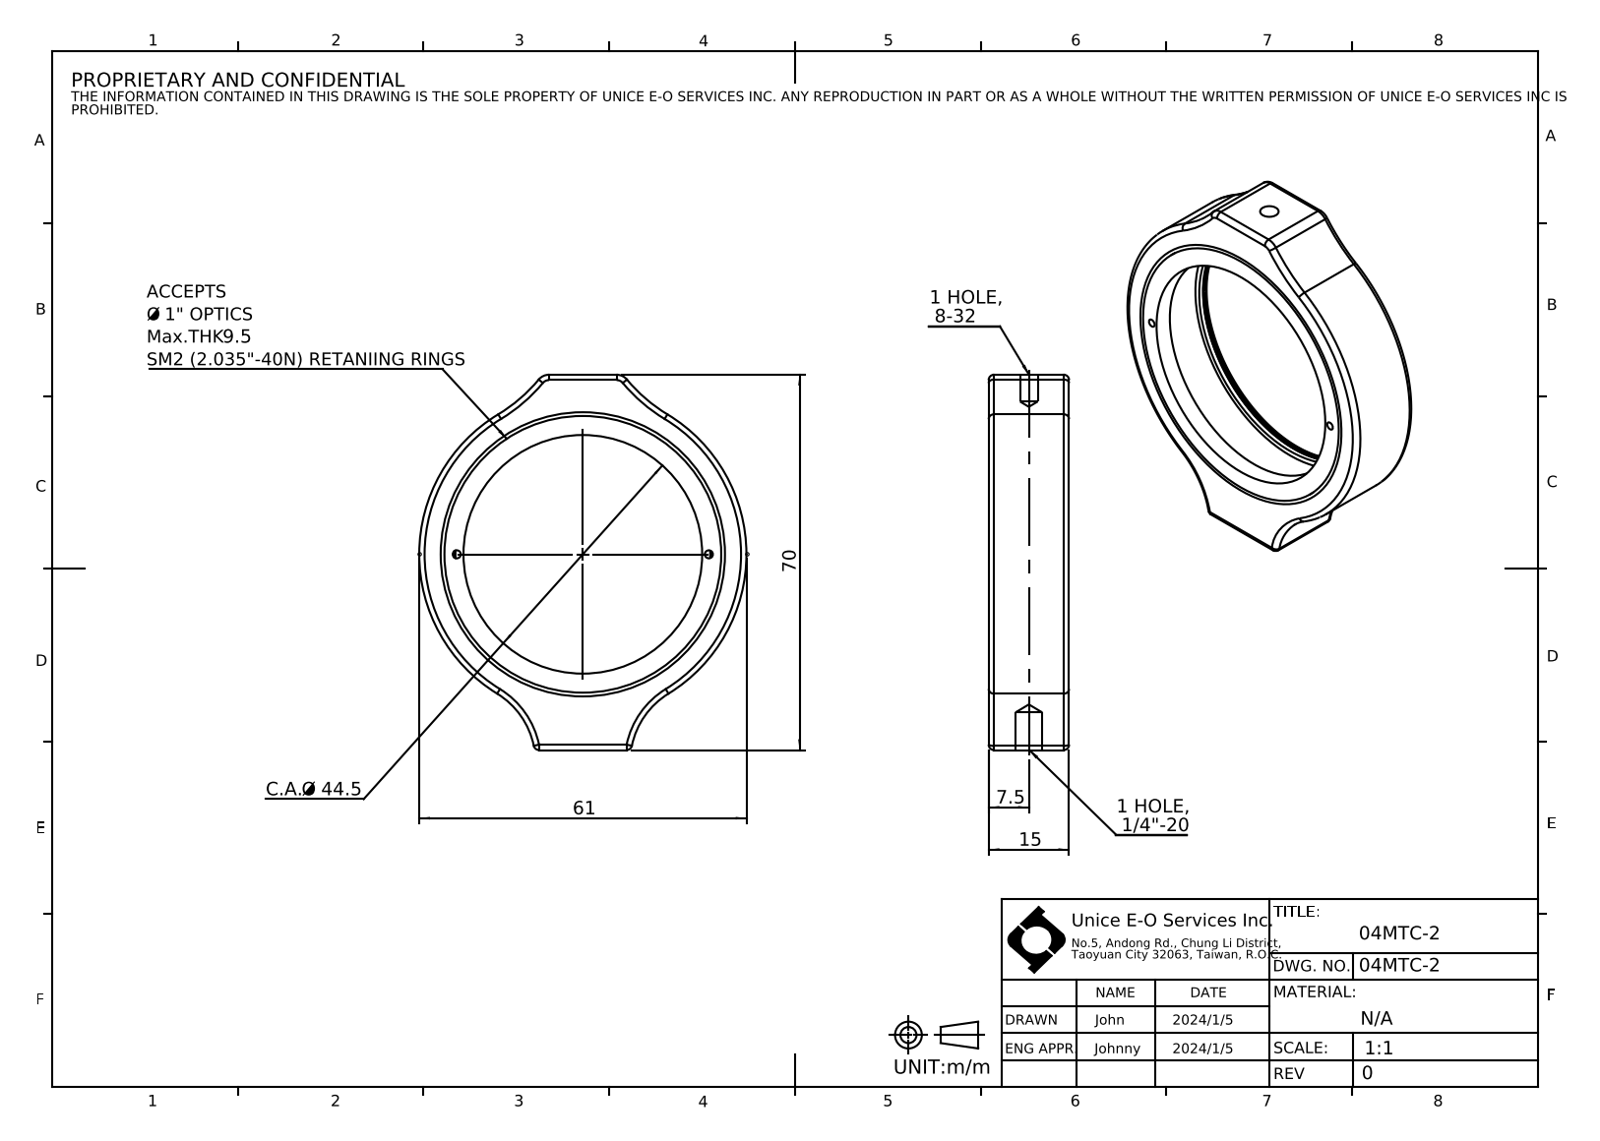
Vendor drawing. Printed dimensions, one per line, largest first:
70
61
C.A. Ø 44.5
15
7.5
